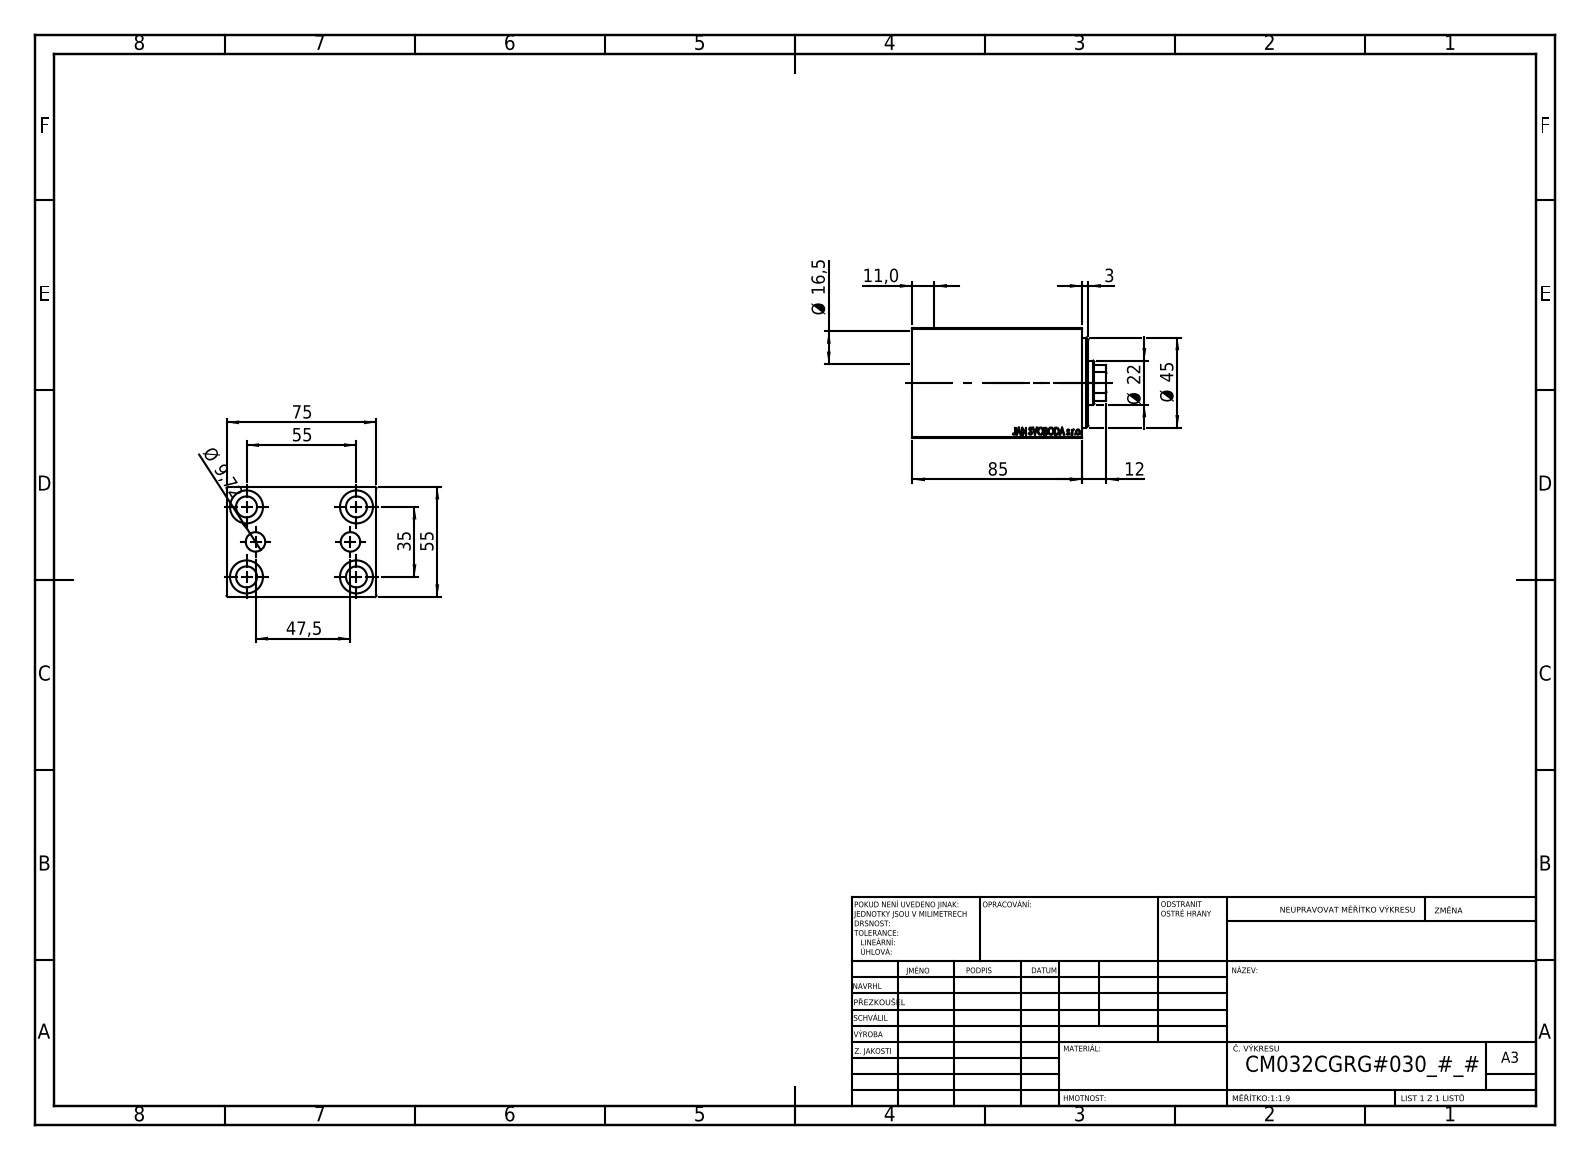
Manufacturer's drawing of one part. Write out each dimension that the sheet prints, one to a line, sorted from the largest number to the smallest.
85
75
55
55
47,5
Ø 45
35
Ø 22
Ø 16,5
12
11,0
Ø 9,72
3
